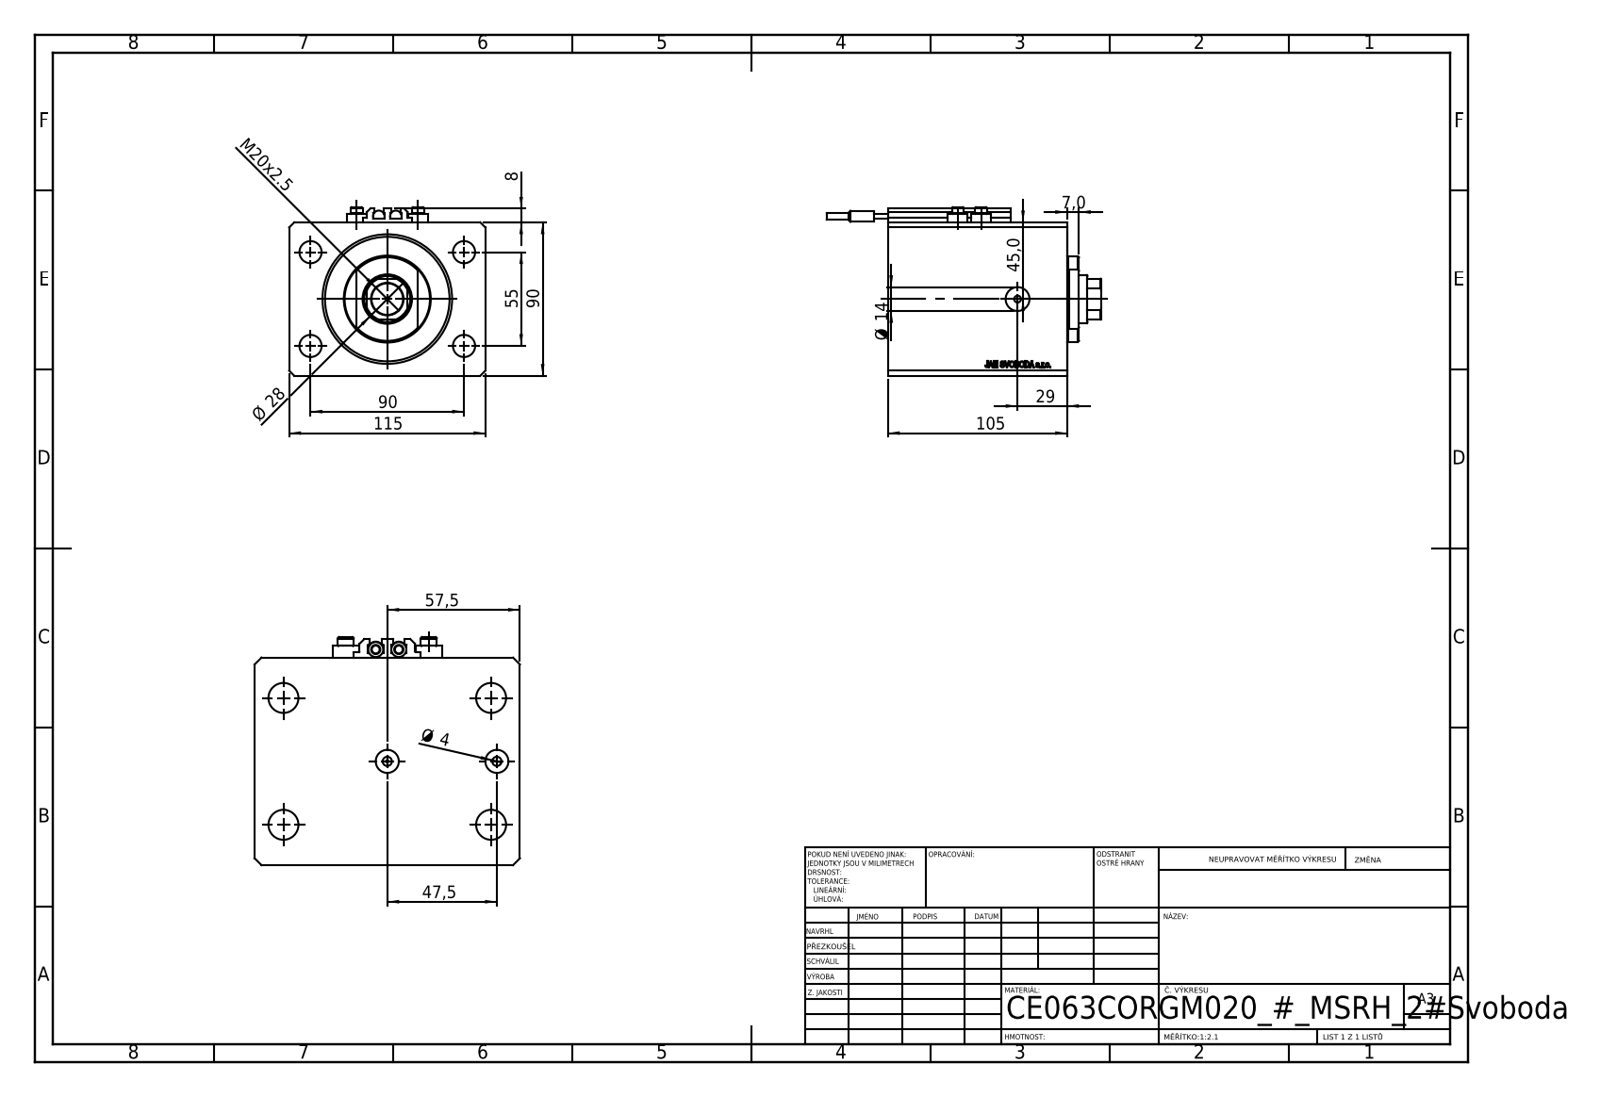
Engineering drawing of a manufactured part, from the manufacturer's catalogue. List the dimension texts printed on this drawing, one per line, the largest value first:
115
105
90
90
57,5
55
47,5
45,0
29
Ø 28
M20x2.5
Ø 14
8
7,0
Ø 4
